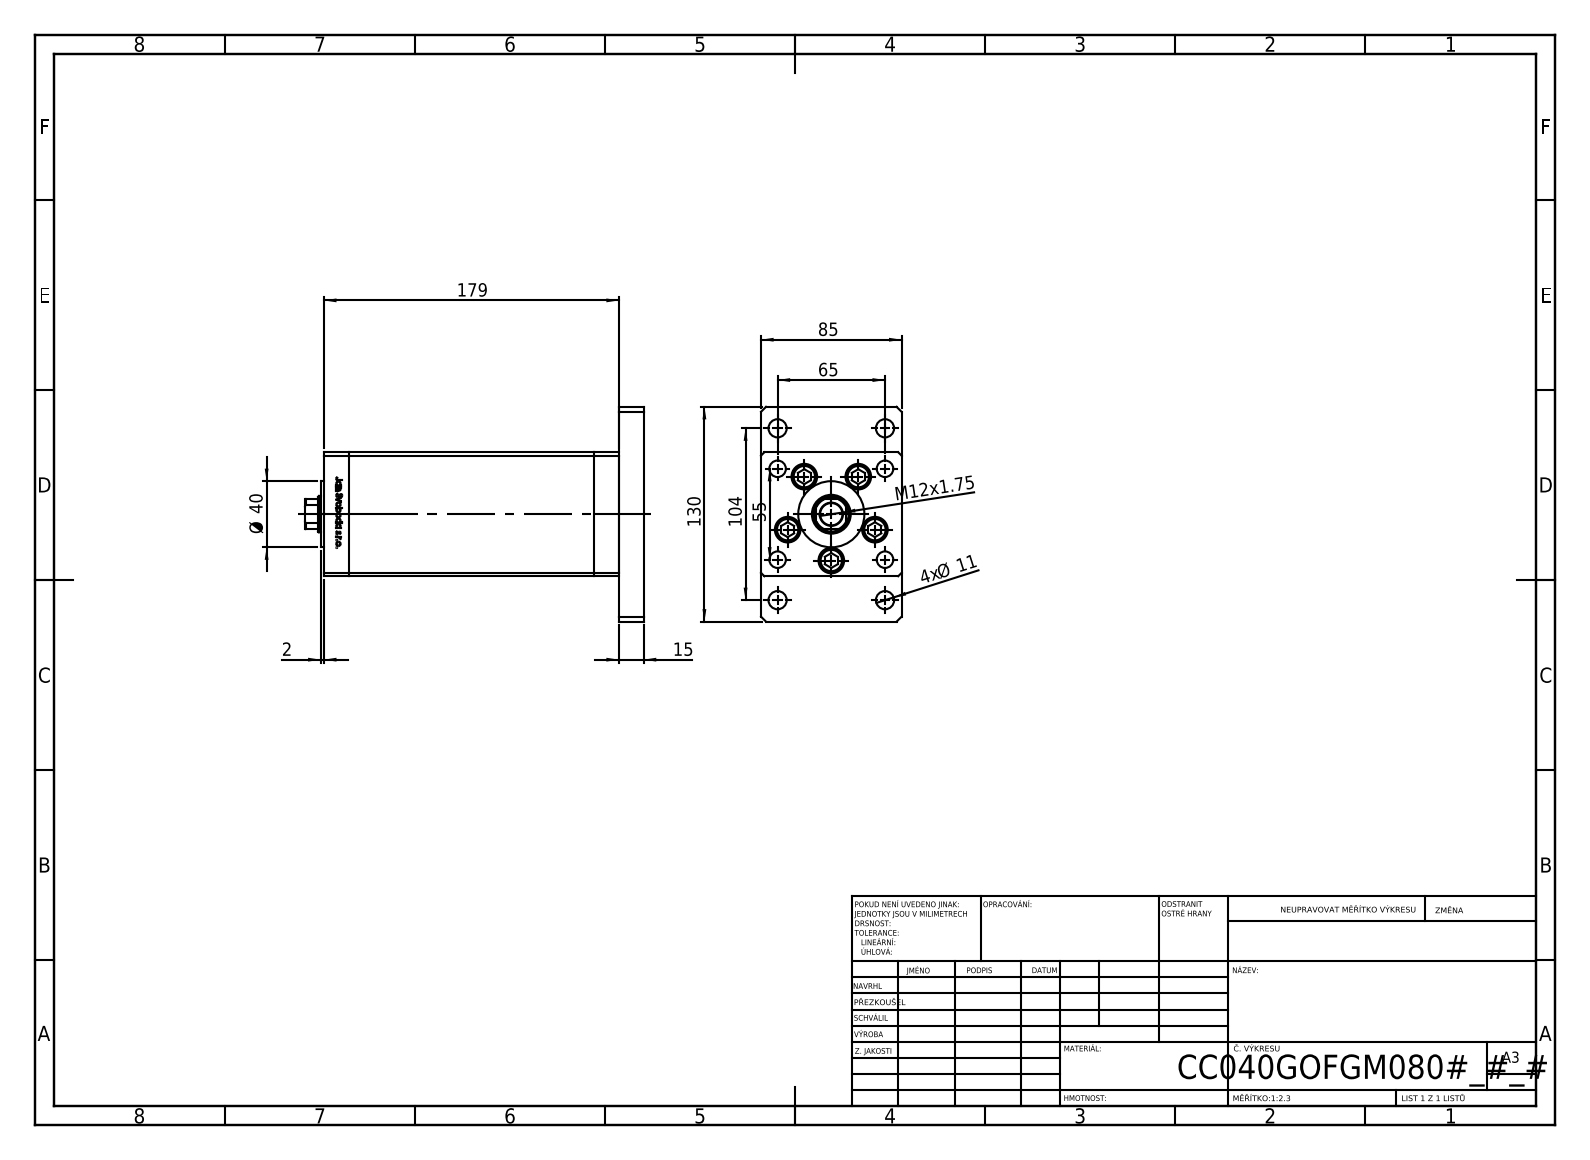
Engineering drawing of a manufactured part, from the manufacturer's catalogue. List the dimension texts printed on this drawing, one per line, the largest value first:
179
130
104
85
65
55
Ø 40
15
M12x1.75
4x Ø 11
2
